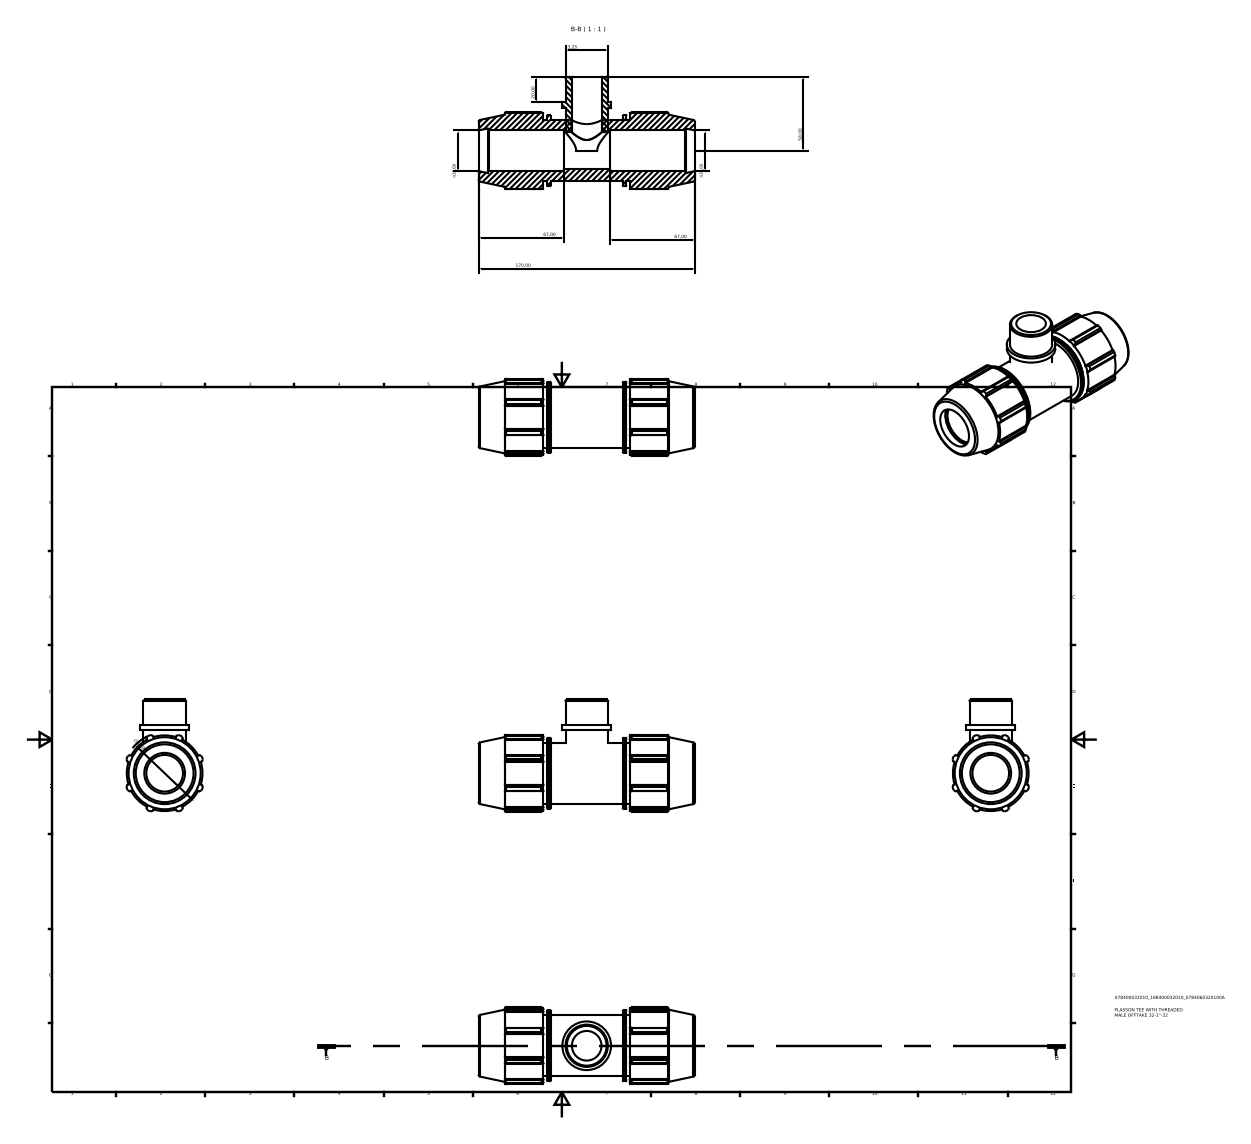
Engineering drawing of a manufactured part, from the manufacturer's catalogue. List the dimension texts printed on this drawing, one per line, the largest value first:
170,00
67,00
67,00
∅64,00
58,00
33,25
n32,00
n32,00
20,00
